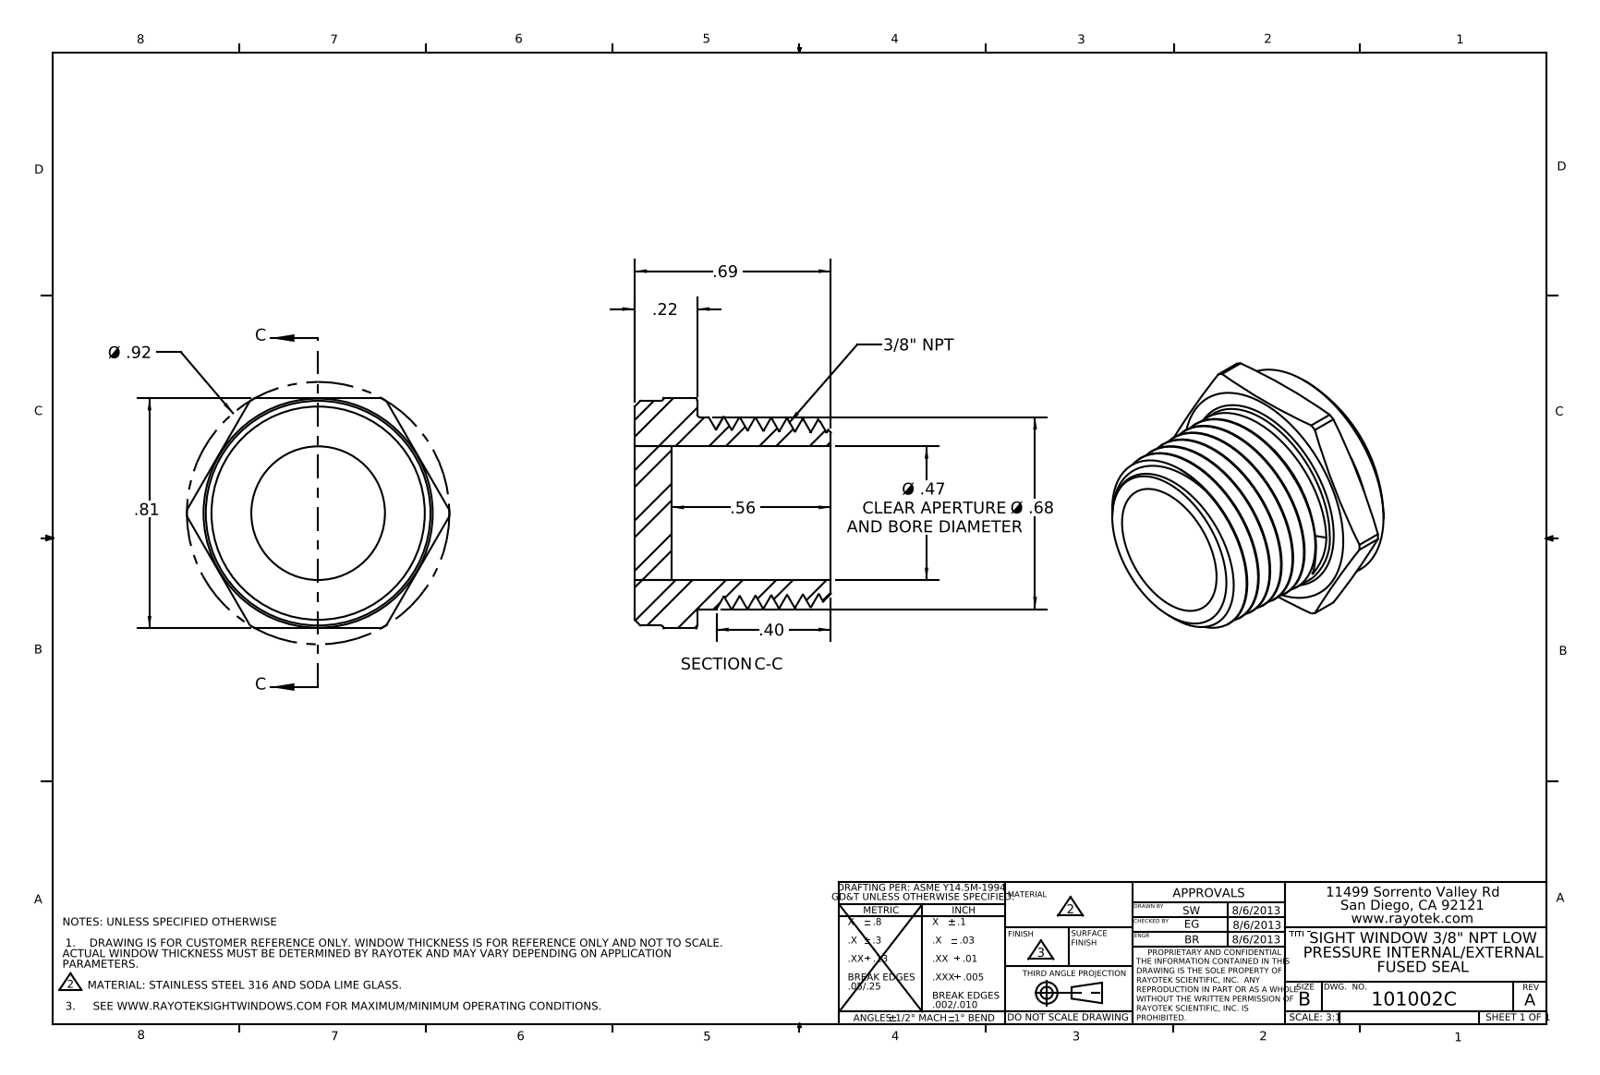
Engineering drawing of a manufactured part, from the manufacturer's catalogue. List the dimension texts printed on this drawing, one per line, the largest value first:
Ø .92
.81
.69
Ø .68
.56
Ø .47 CLEAR APERTURE AND BORE DIAMETER
.40
.22
